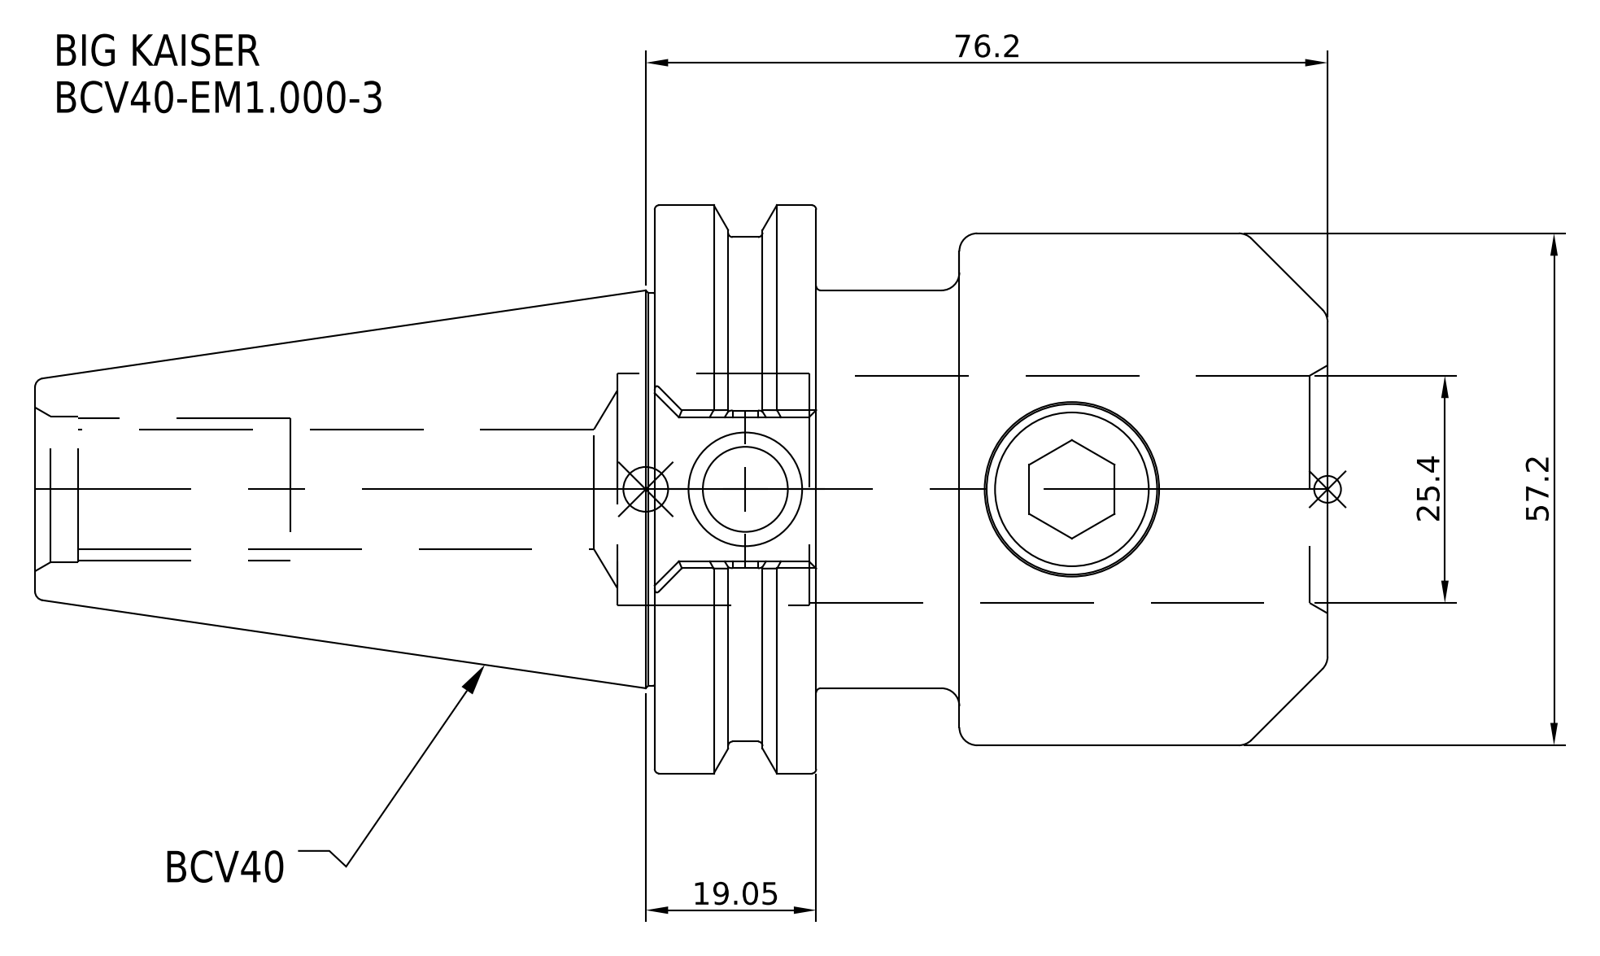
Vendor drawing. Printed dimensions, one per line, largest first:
76.2
57.2
25.4
19.05
